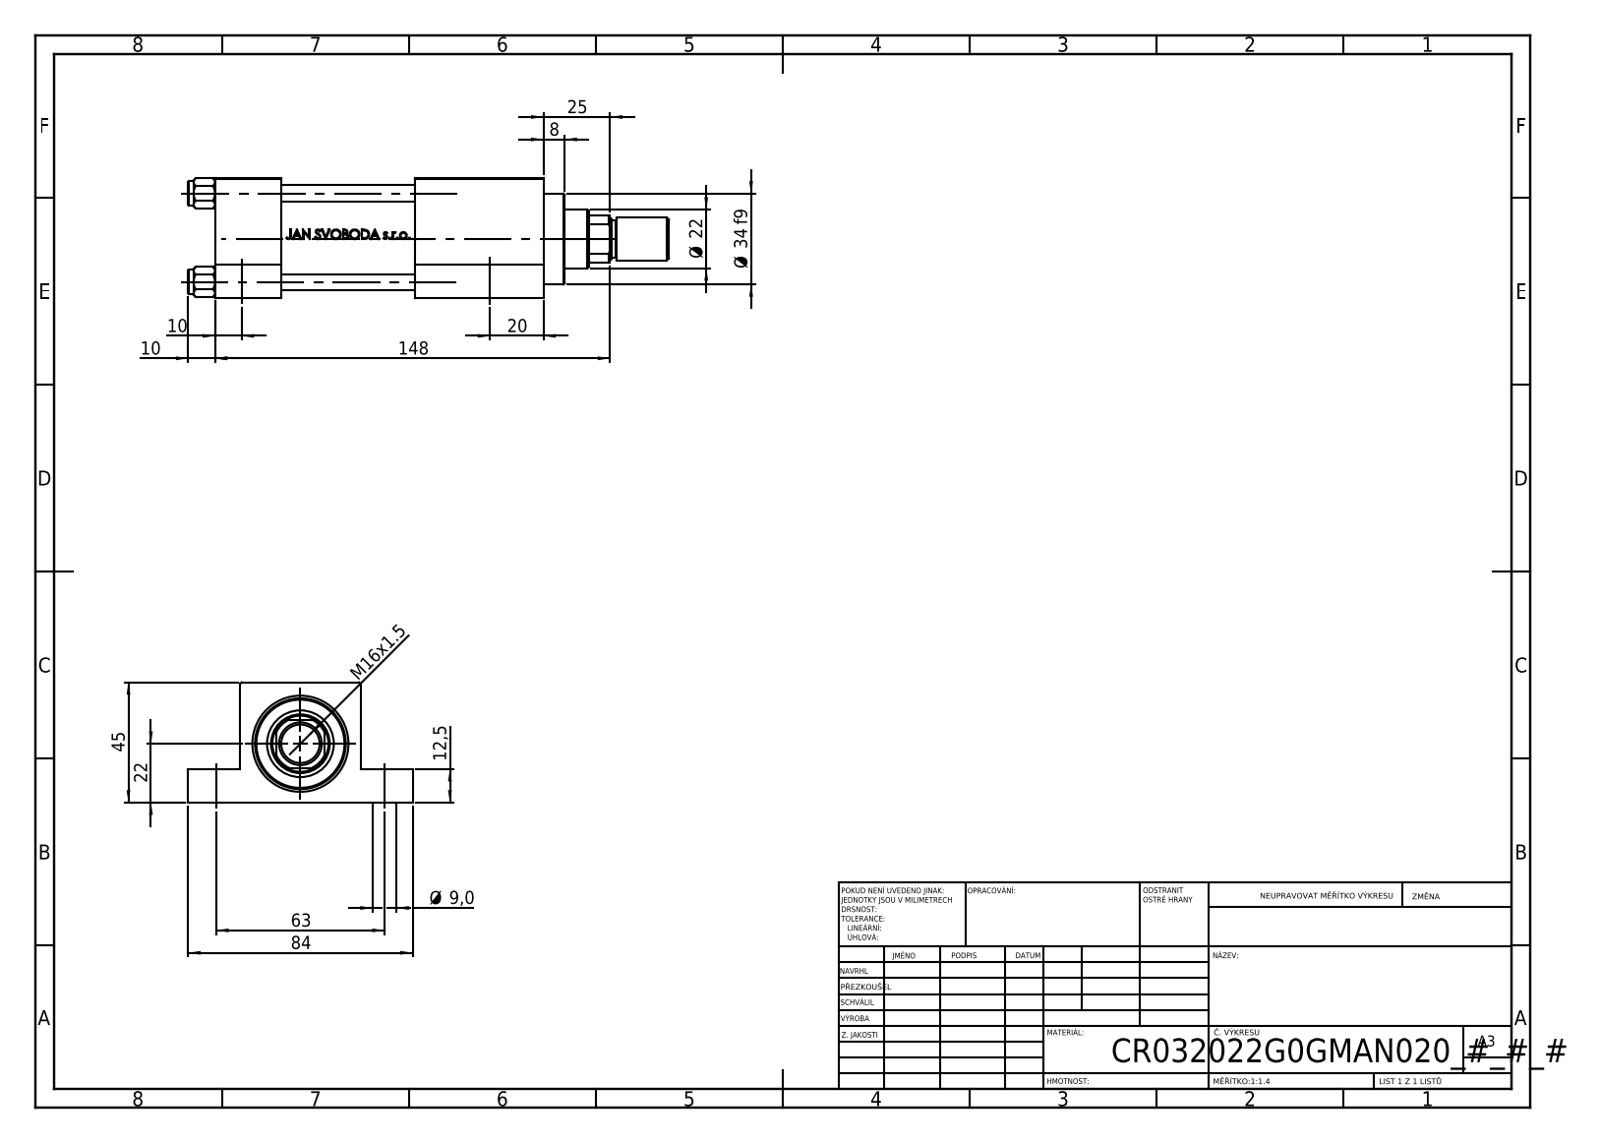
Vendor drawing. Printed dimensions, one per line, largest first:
148
84
63
45
Ø 34 f9
25
Ø 22
22
20
M16x1.5
12,5
10
10
Ø 9,0
8
